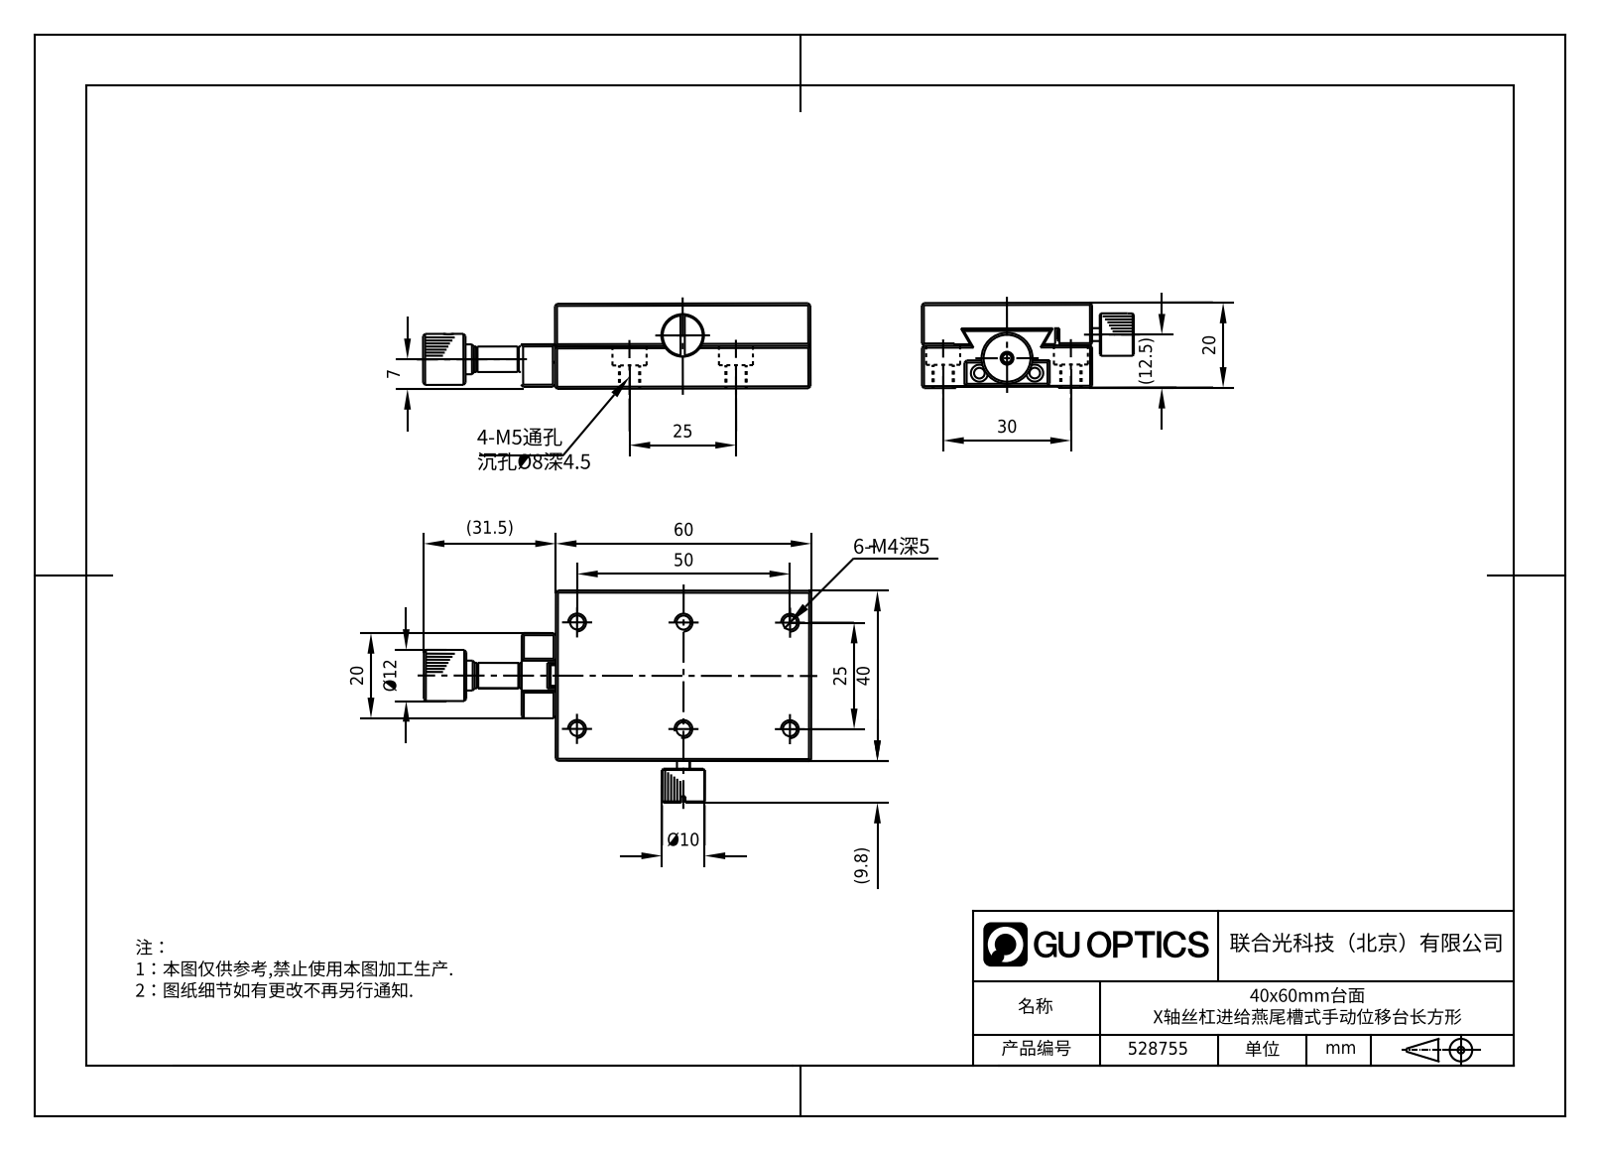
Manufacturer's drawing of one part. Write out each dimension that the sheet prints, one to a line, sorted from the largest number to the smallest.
60
50
40
(31.5)
30
25
25
20
20
(12.5)
Ø12
Ø10
(9.8)
7
